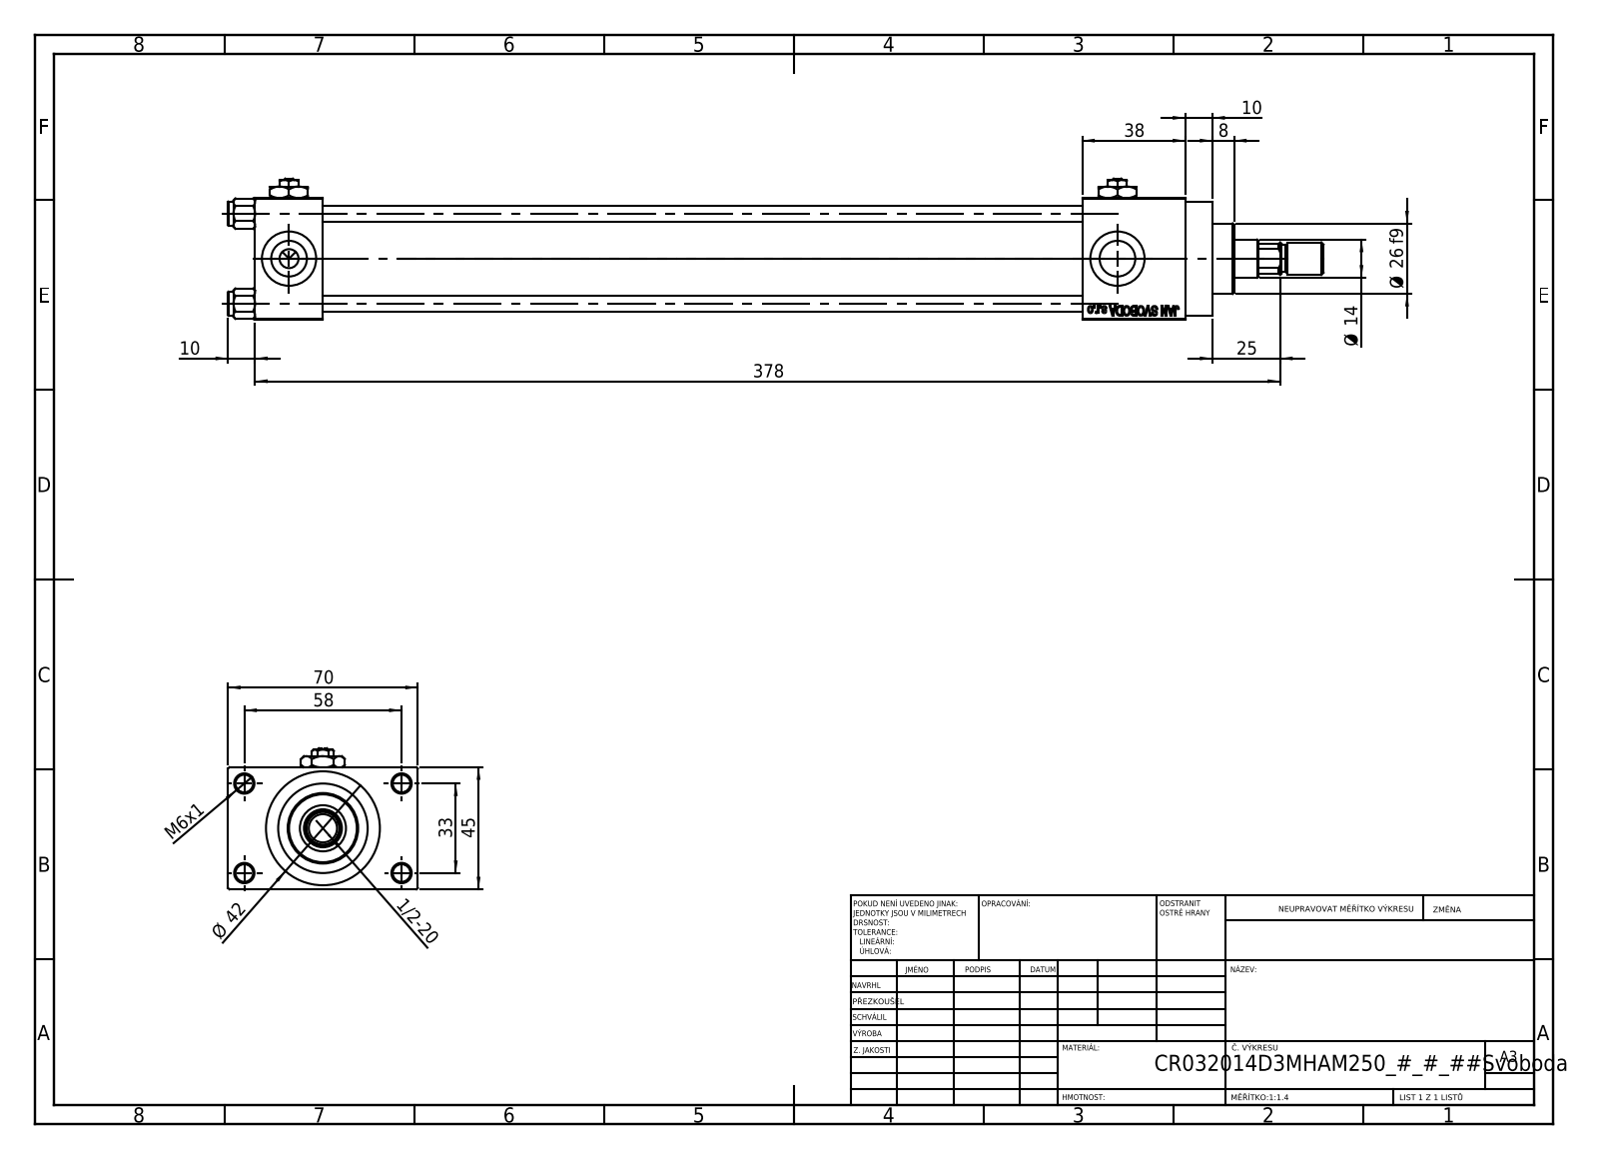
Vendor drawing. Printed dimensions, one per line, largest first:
378
70
58
45
Ø 42
38
33
Ø 26 f9
25
Ø 14
10
10
8
M6x1
1/2-20
